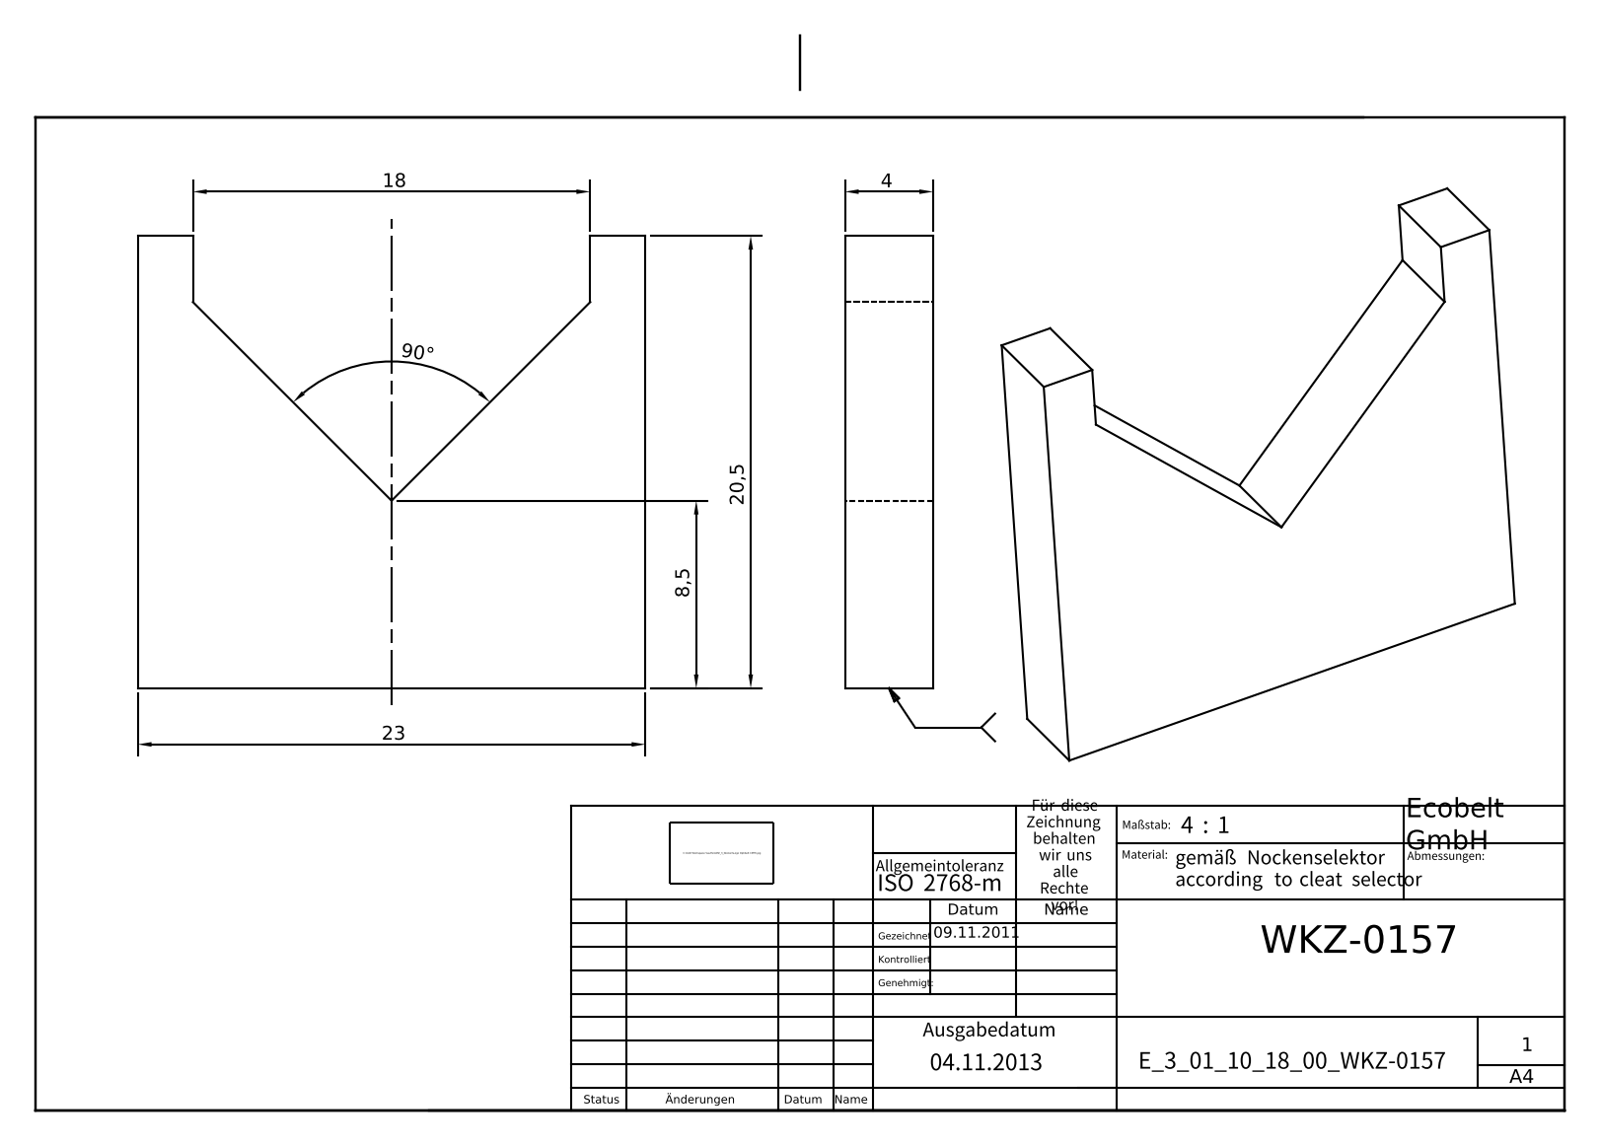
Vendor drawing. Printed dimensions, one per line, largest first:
90°
23
20,5
18
8,5
4
